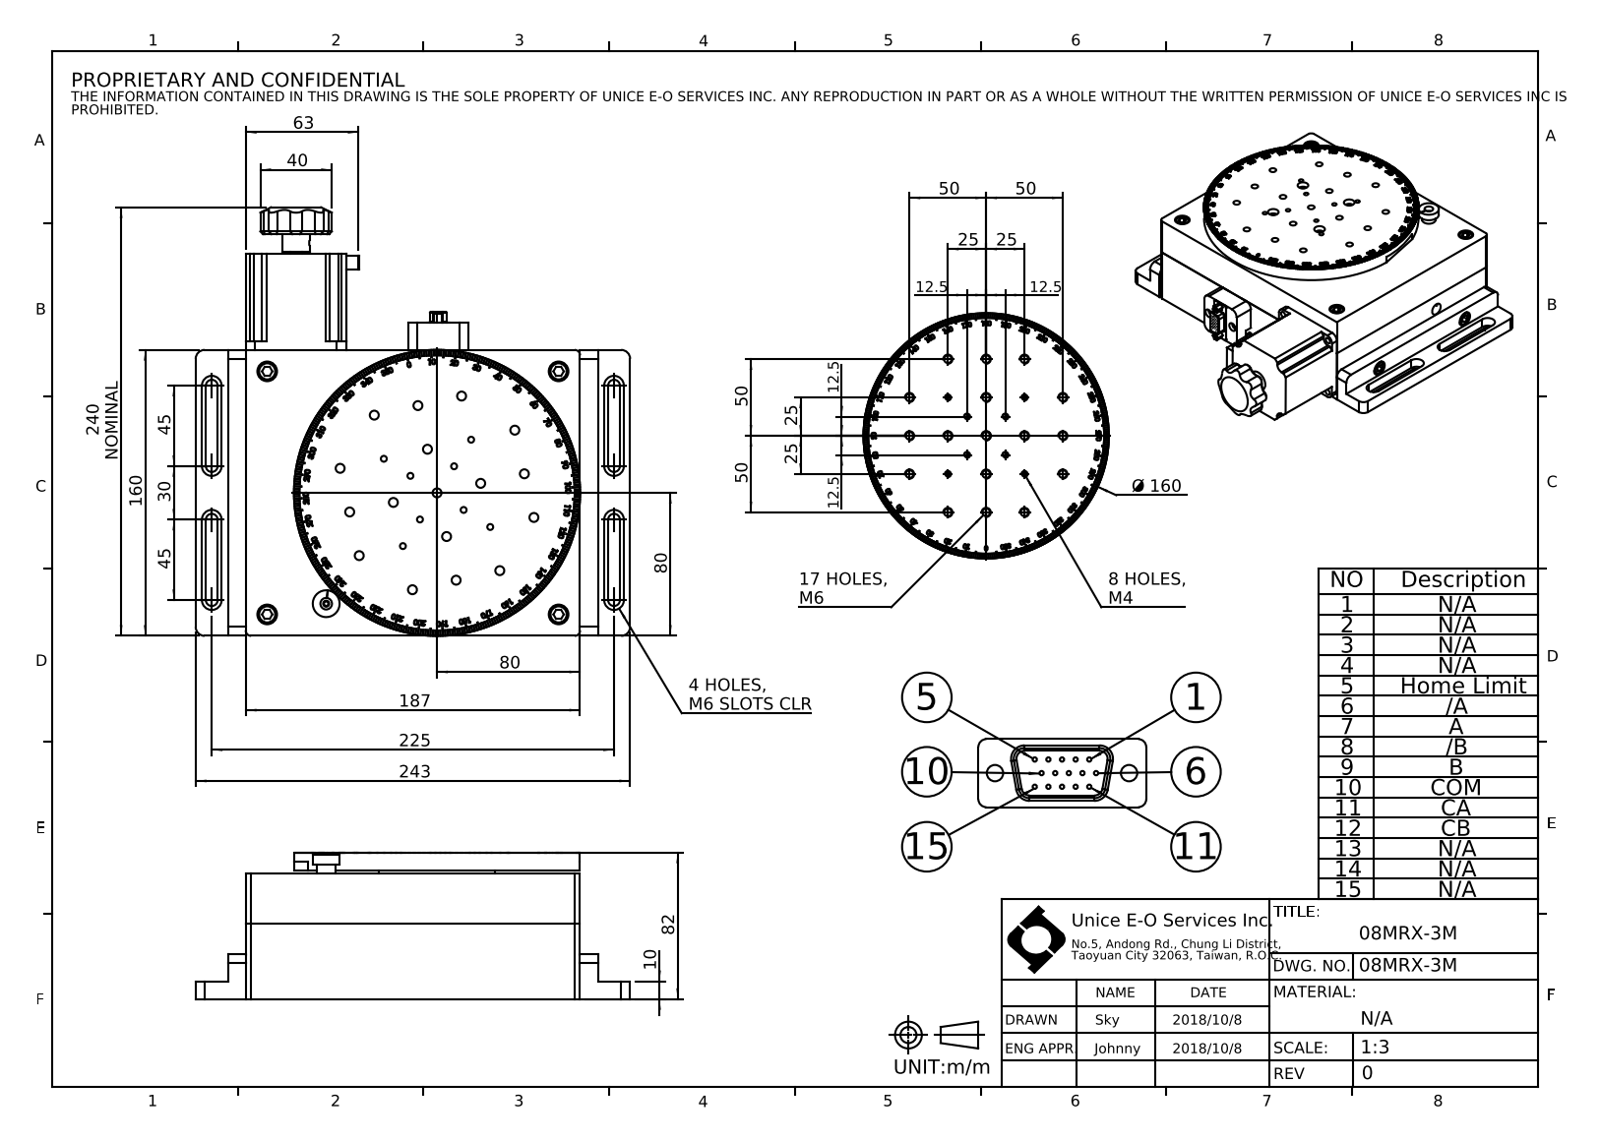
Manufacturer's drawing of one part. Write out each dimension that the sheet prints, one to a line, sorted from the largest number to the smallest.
243
240 NOMINAL
225
187
160
Ø 160
82
80
80
63
50
50
50
50
45
45
40
30
25
25
25
25
12.5
12.5
12.5
12.5
10
4 HOLES, M6 SLOTS CLR
